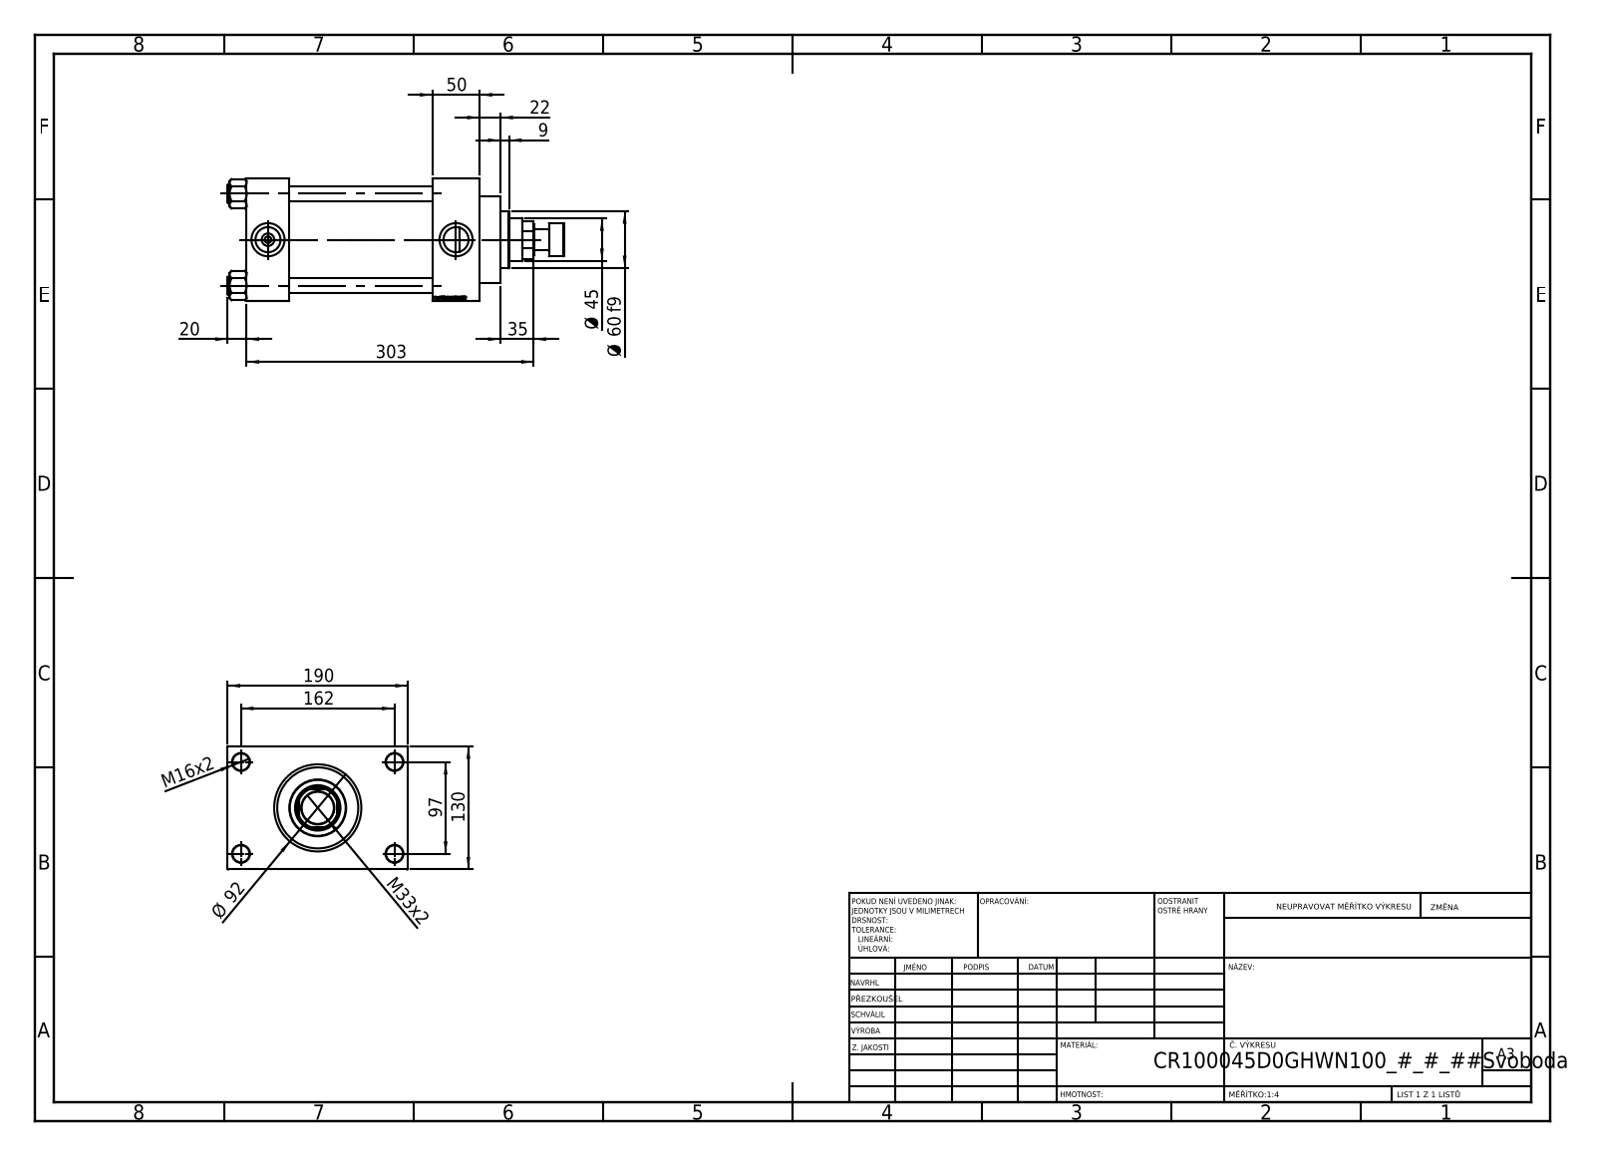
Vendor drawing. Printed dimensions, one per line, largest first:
303
190
162
130
97
Ø 92
Ø 60 f9
50
Ø 45
35
M33x2
22
20
M16x2
9
